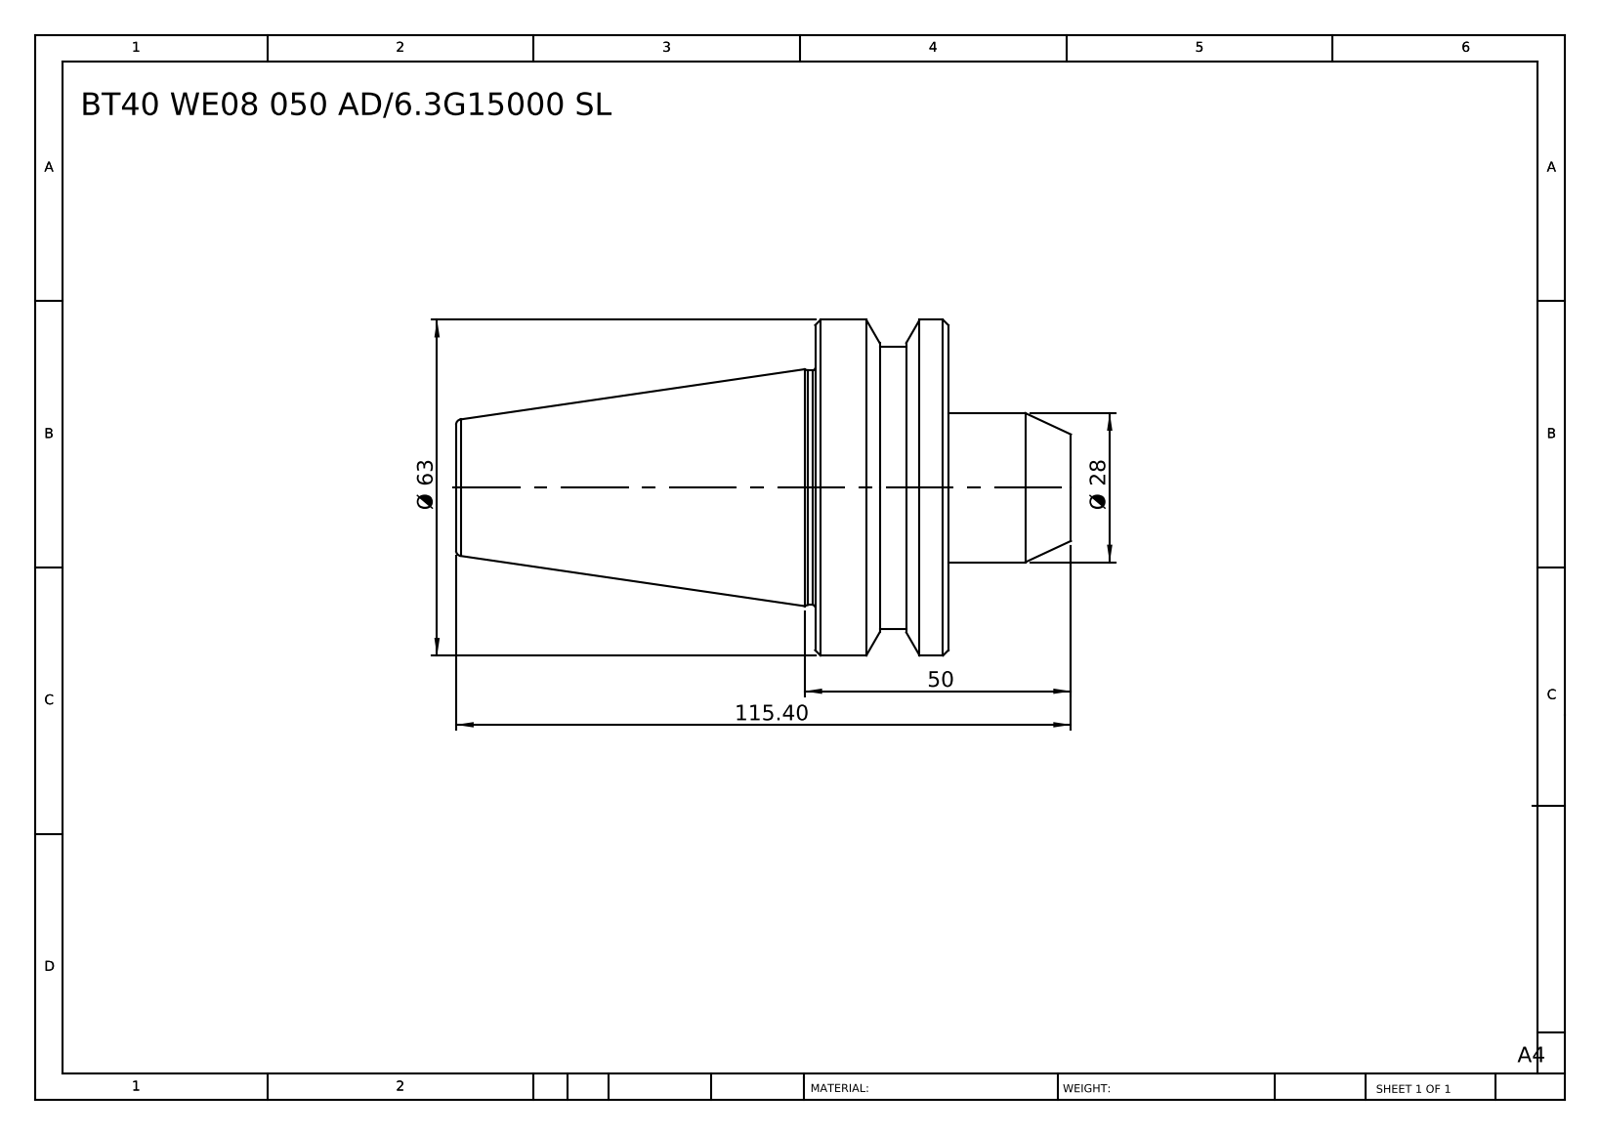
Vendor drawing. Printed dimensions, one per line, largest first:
115.40
Ø 63
50
Ø 28
